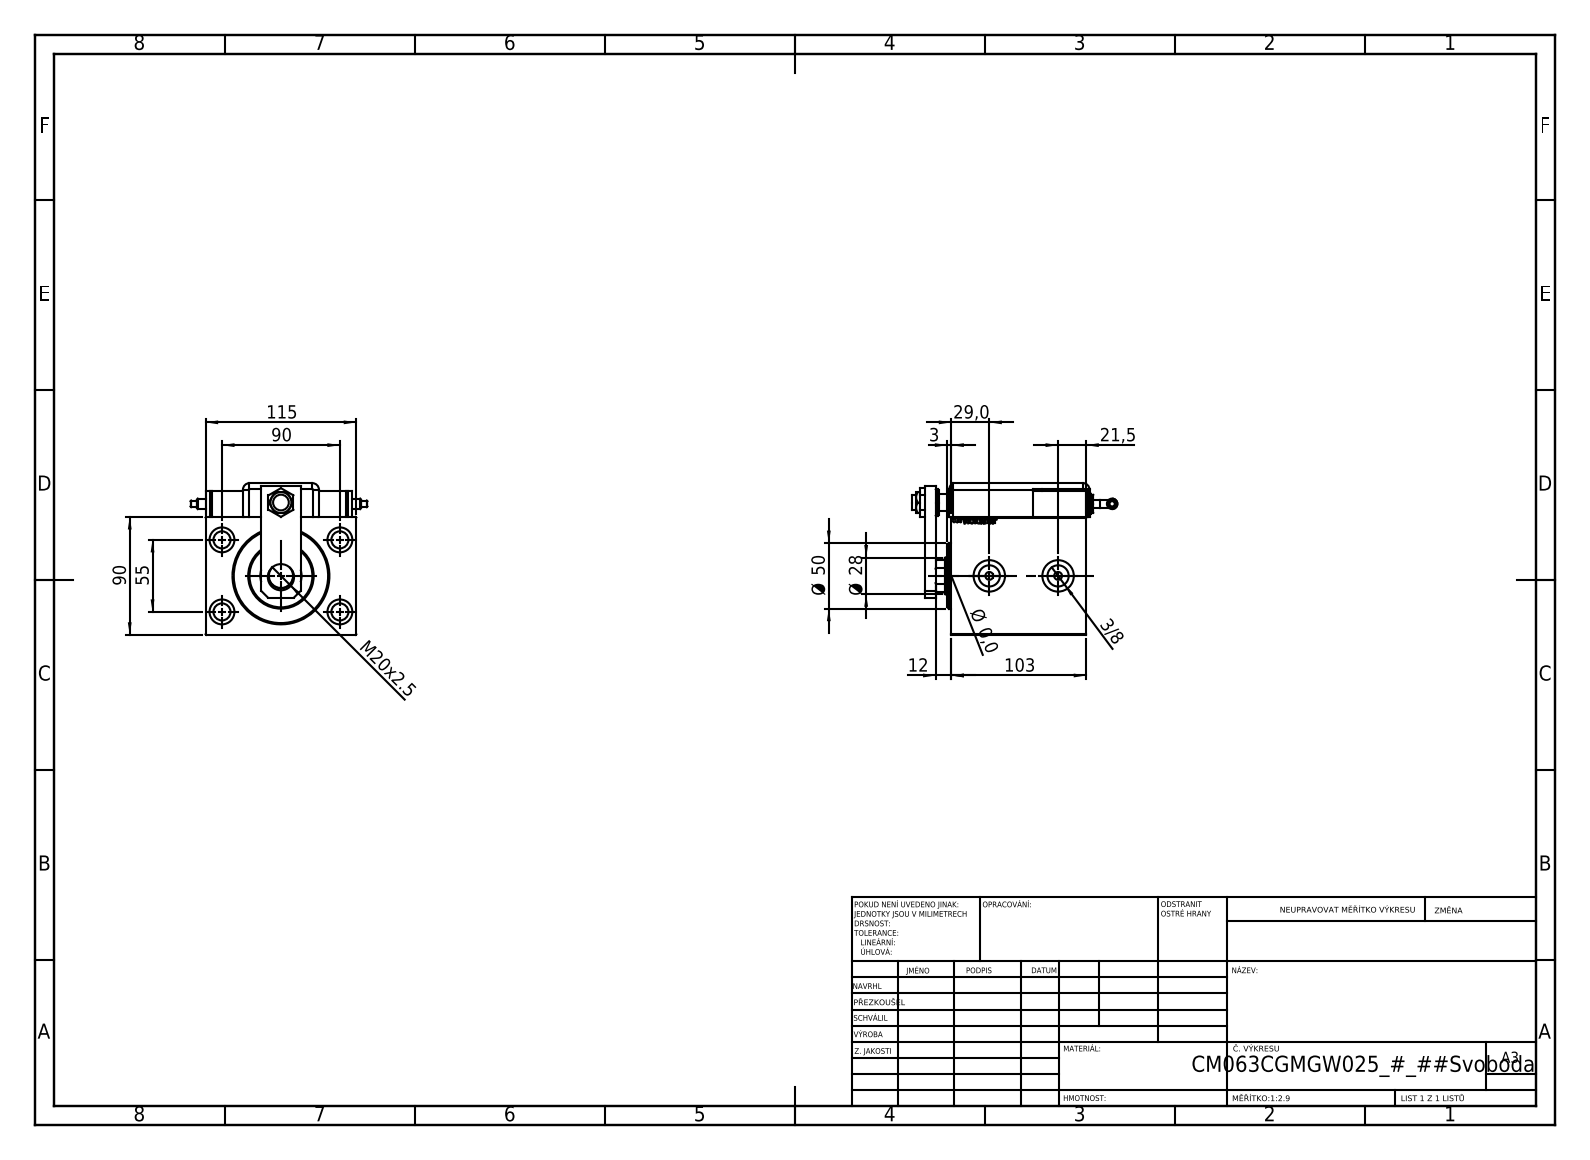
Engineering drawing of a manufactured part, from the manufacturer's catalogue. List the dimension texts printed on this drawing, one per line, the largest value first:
115
103
90
90
55
Ø 50
29,0
Ø 28
21,5
M20x2.5
12
3
3/8
